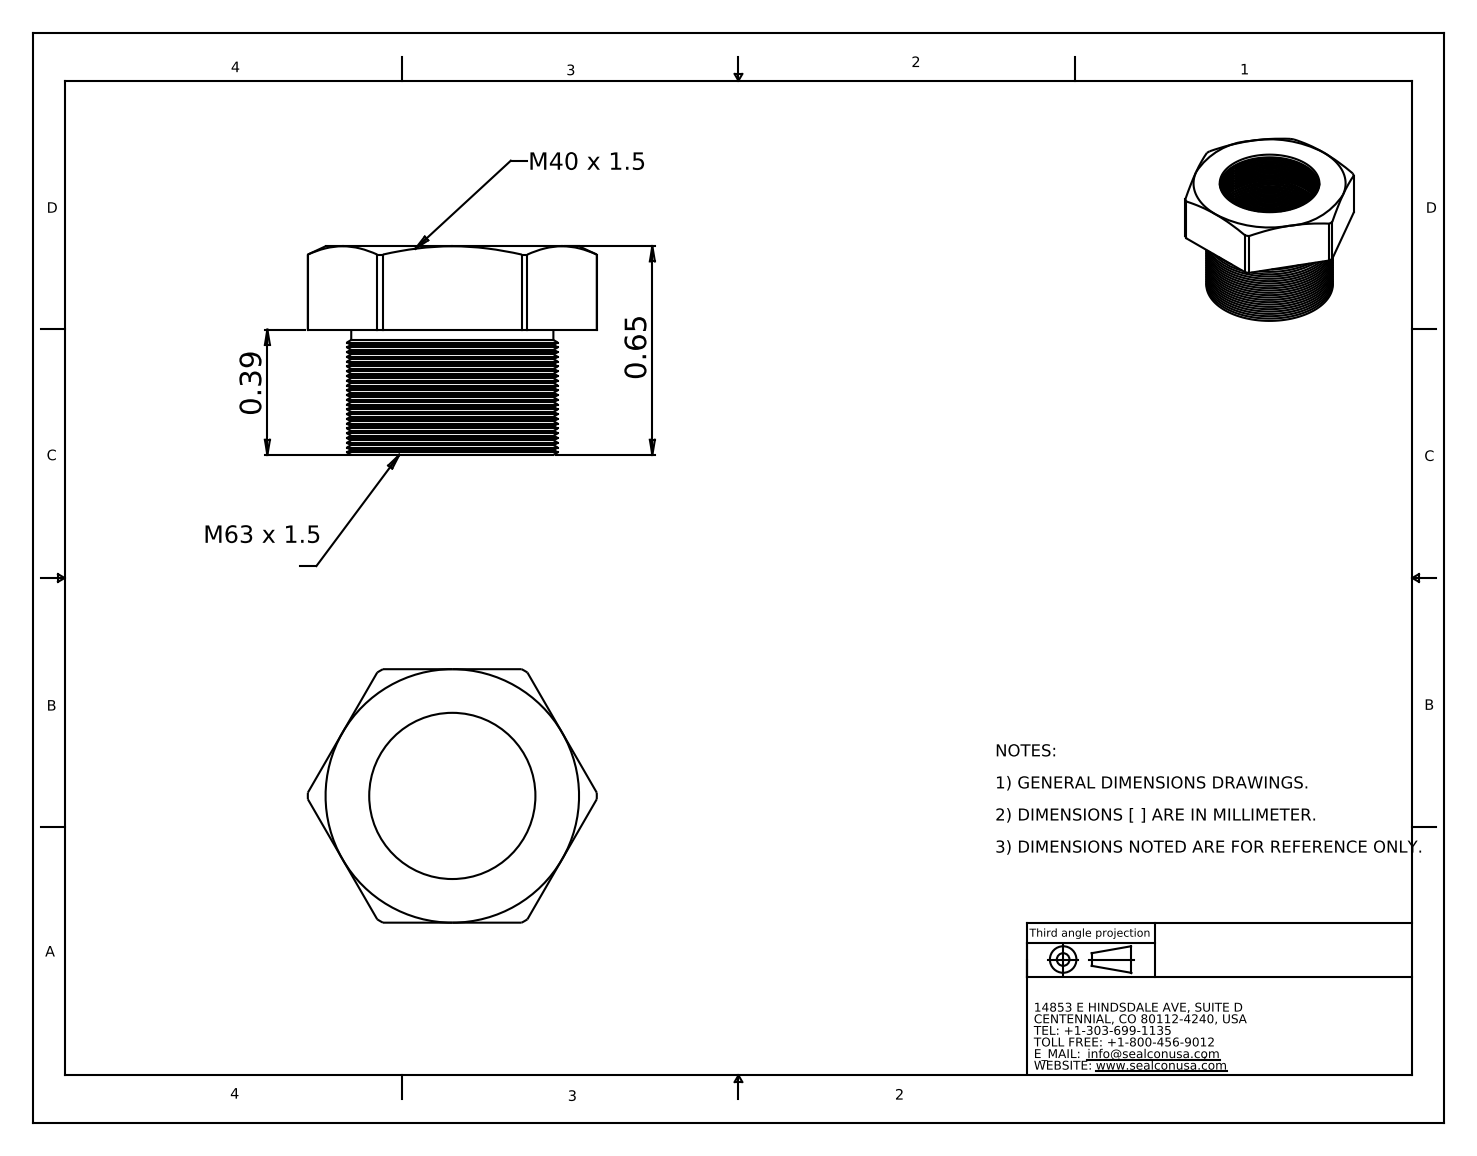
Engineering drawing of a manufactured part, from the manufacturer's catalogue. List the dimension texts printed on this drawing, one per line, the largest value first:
0.65
0.39
